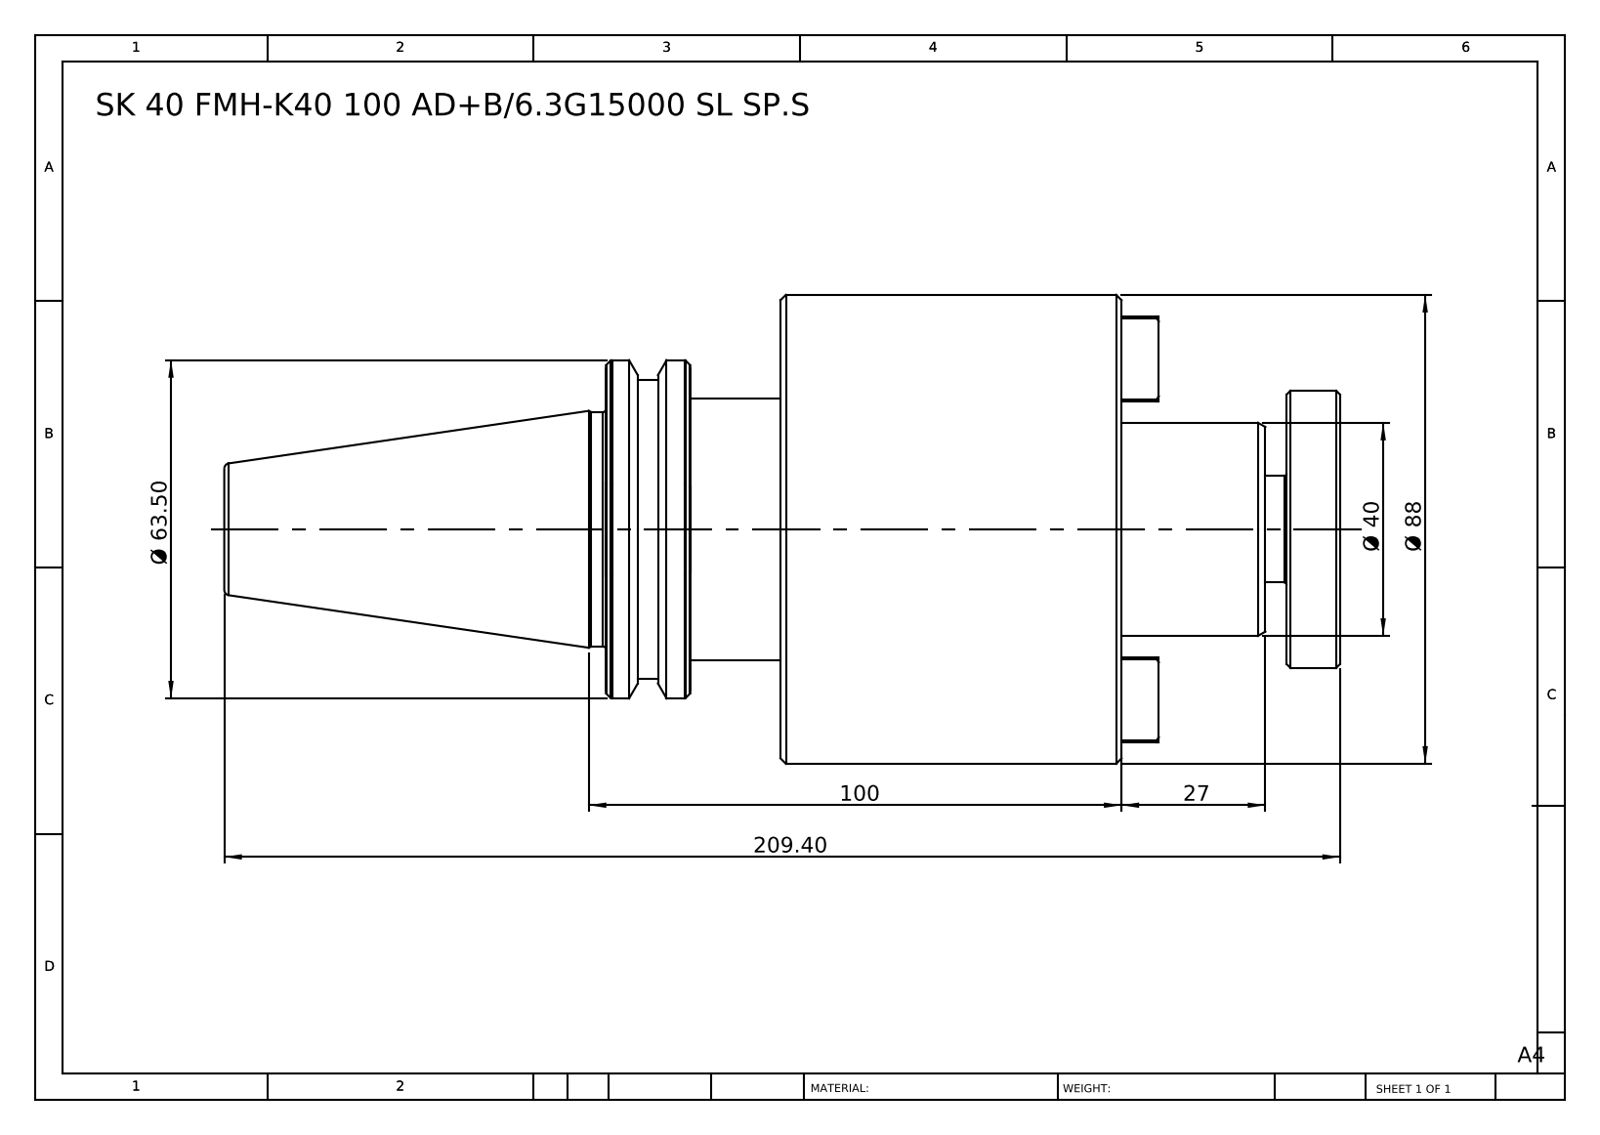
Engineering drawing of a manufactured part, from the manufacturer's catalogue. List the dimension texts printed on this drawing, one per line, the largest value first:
209.40
100
Ø 88
Ø 63.50
Ø 40
27
